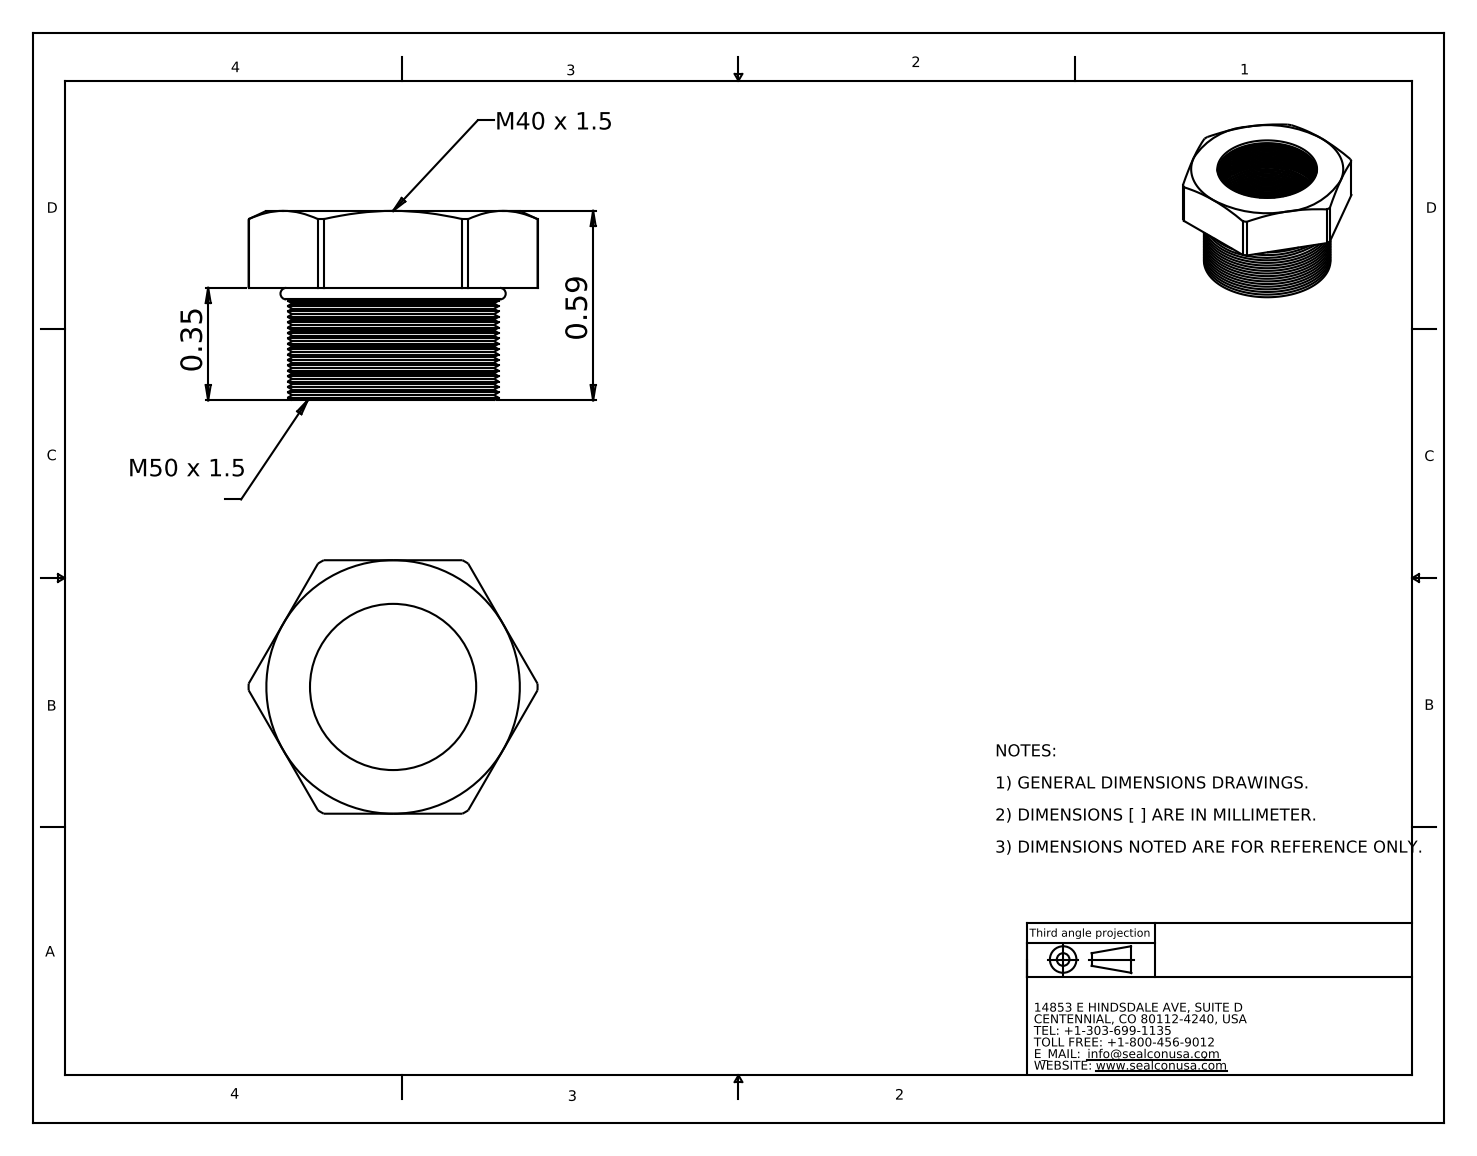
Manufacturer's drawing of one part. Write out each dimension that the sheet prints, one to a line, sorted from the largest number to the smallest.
0.59
0.35
